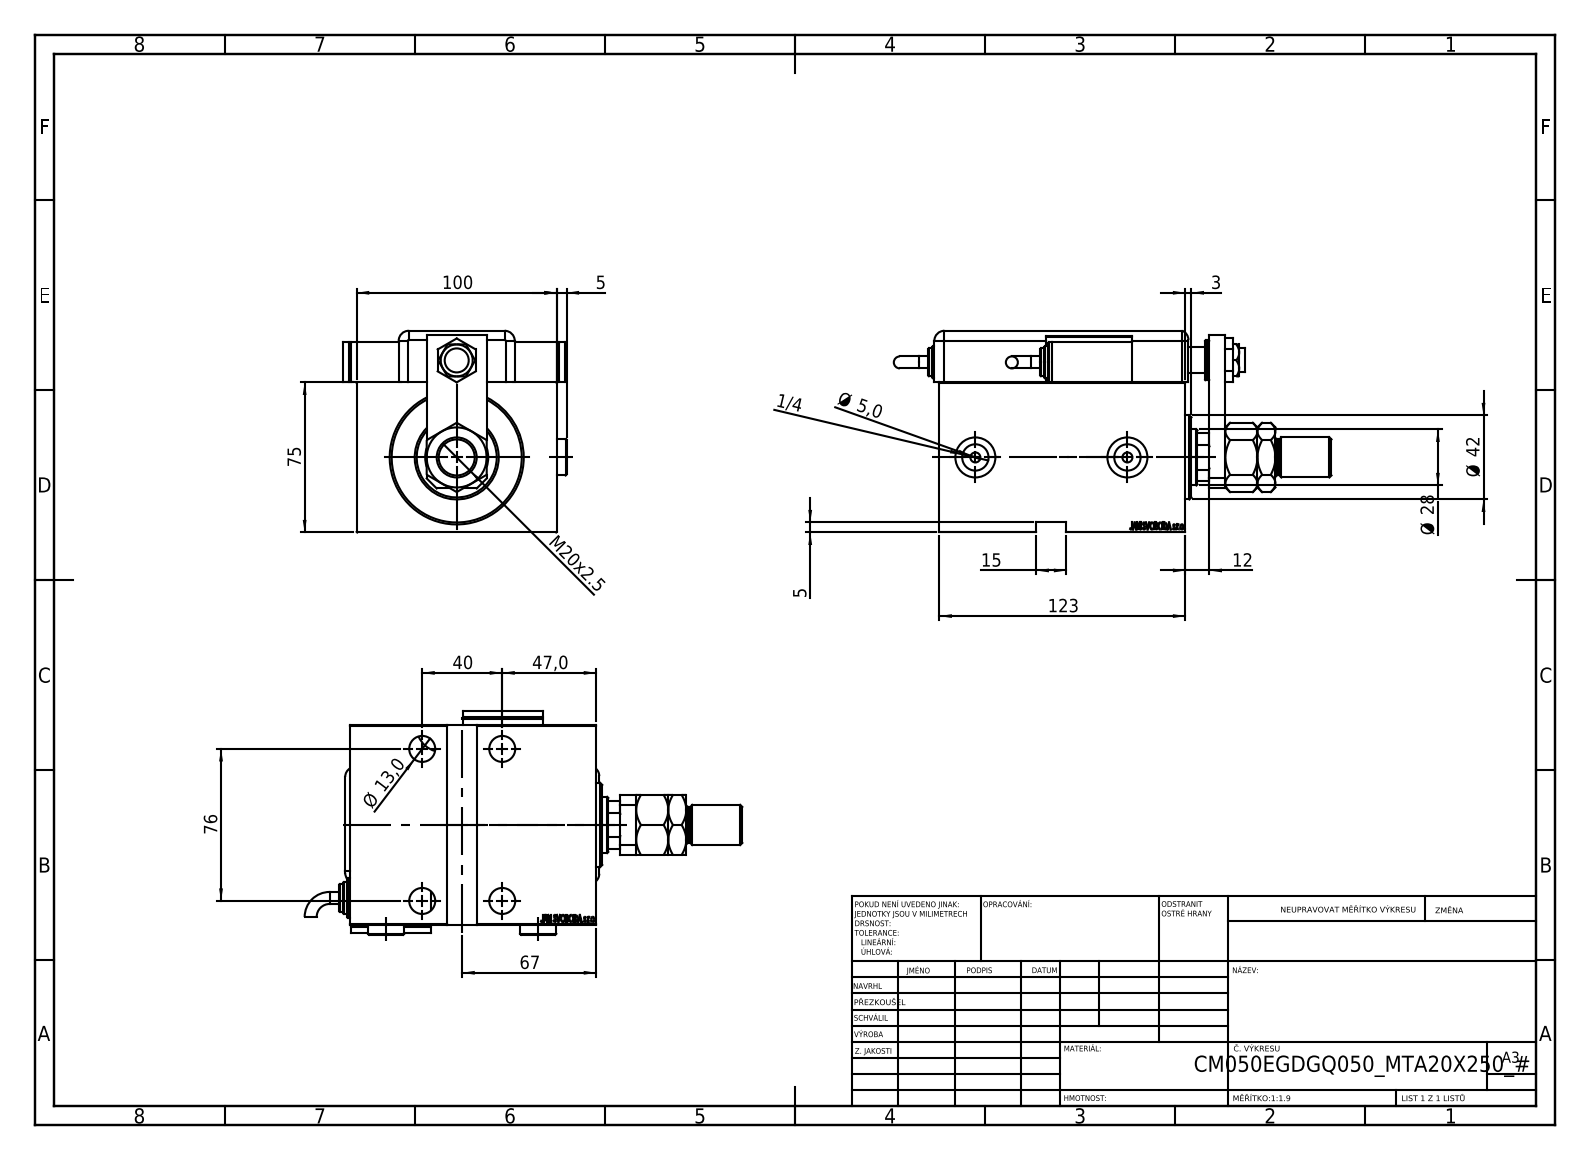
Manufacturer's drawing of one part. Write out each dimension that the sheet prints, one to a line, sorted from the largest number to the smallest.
123
100
76
75
67
47,0
Ø 42
40
Ø 28
M20x2.5
15
Ø 13,0
12
5
Ø 5,0
5
3
1/4
